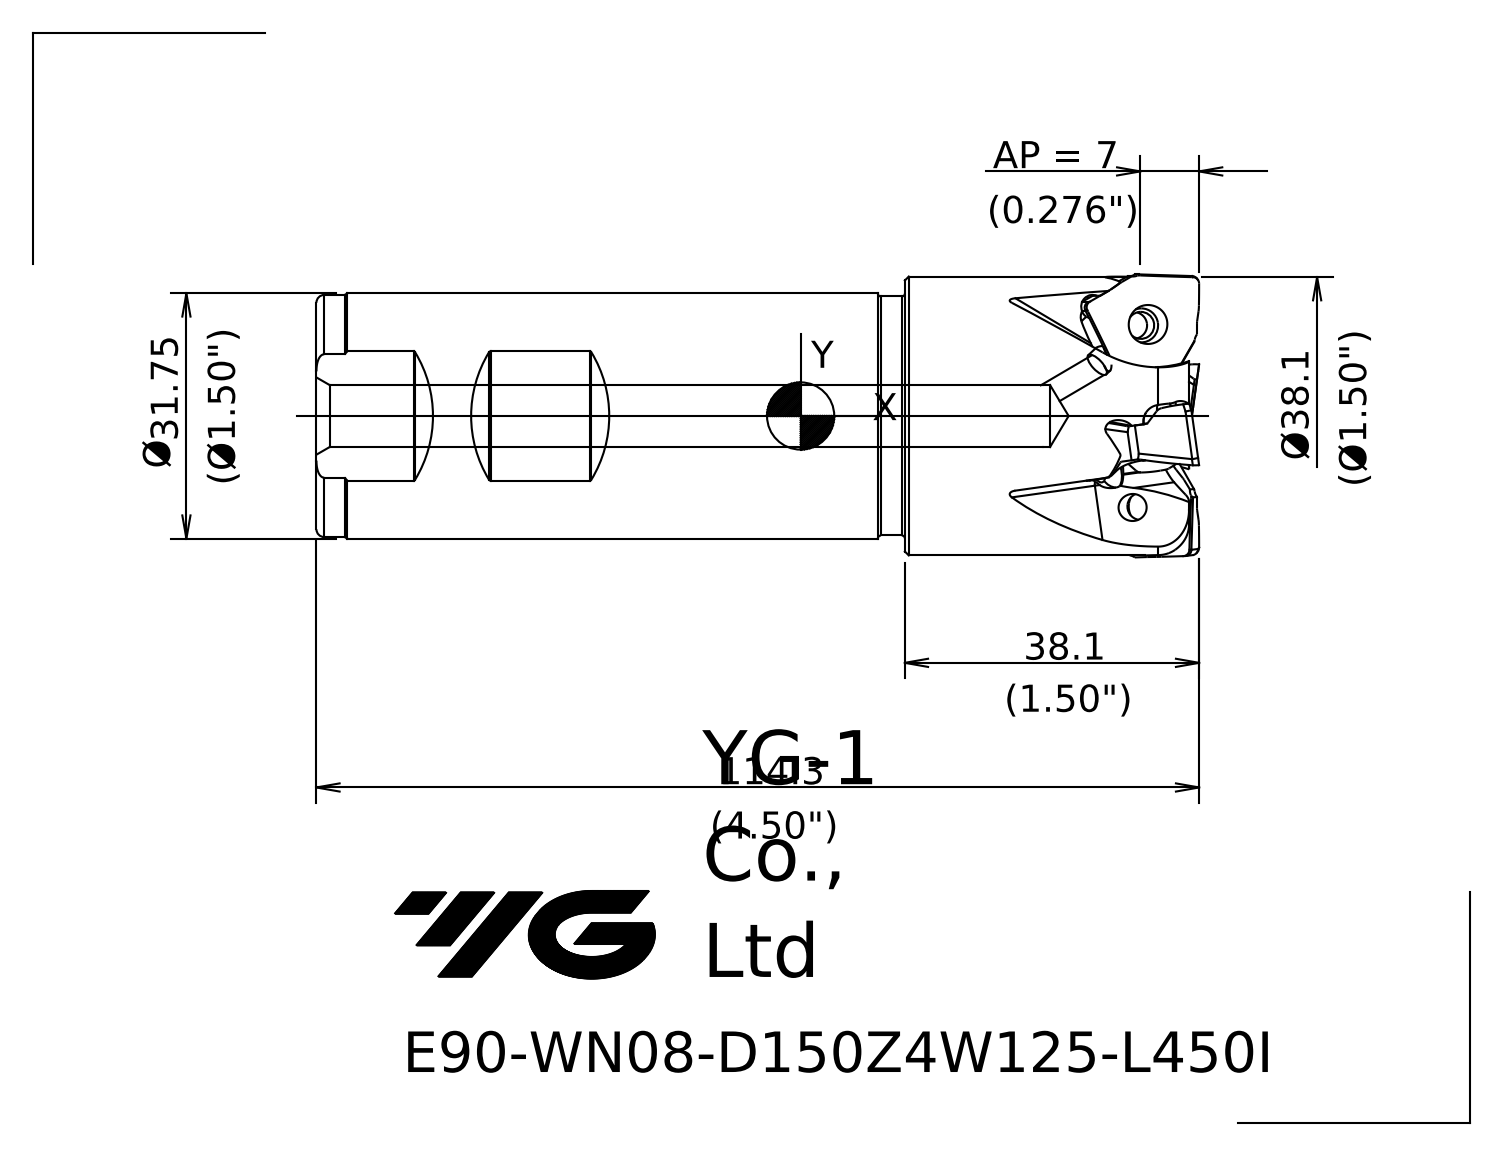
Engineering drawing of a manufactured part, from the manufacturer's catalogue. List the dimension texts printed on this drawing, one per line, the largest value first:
114.3
Ø38.1
38.1
Ø 31.75
AP = 7
